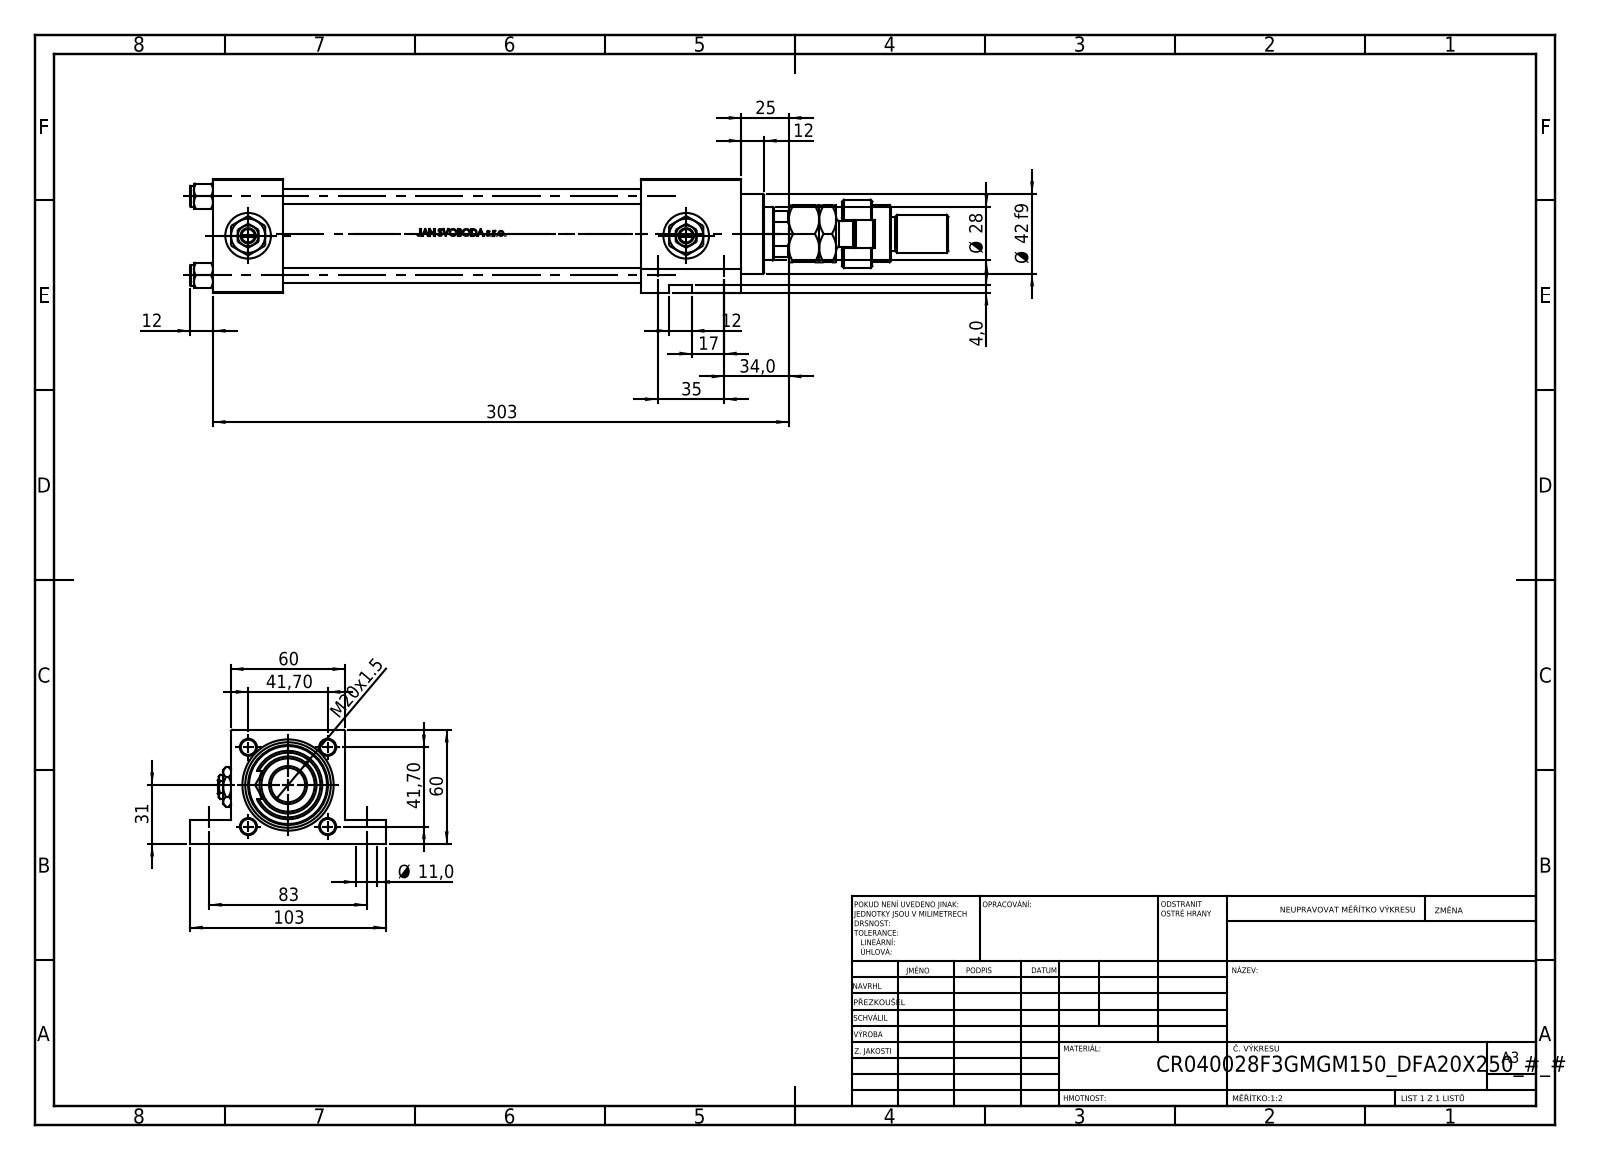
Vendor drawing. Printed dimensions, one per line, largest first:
303
103
83
60
60
Ø 42 f9
41,70
41,70
35
34,0
31
Ø 28
25
M20x1.5
17
12
12
12
Ø 11,0
4,0
